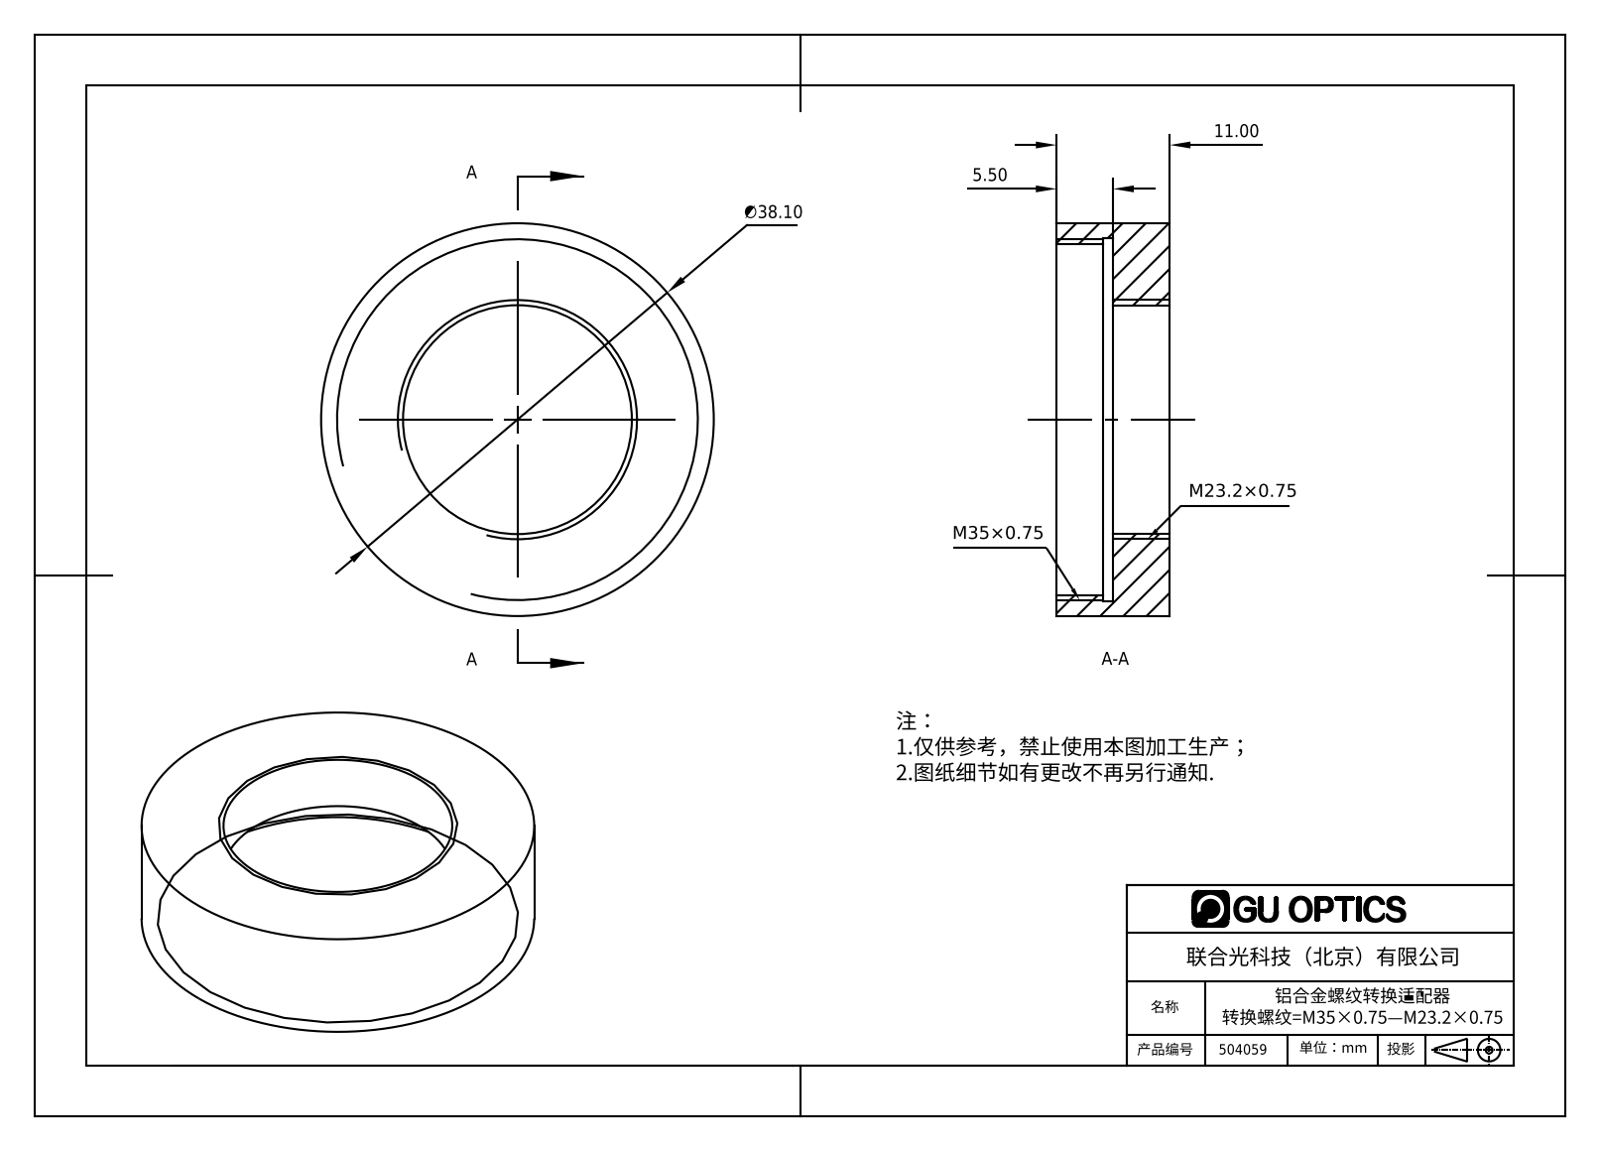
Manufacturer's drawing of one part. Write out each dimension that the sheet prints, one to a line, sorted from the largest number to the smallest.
∅38.10
11.00
5.50
